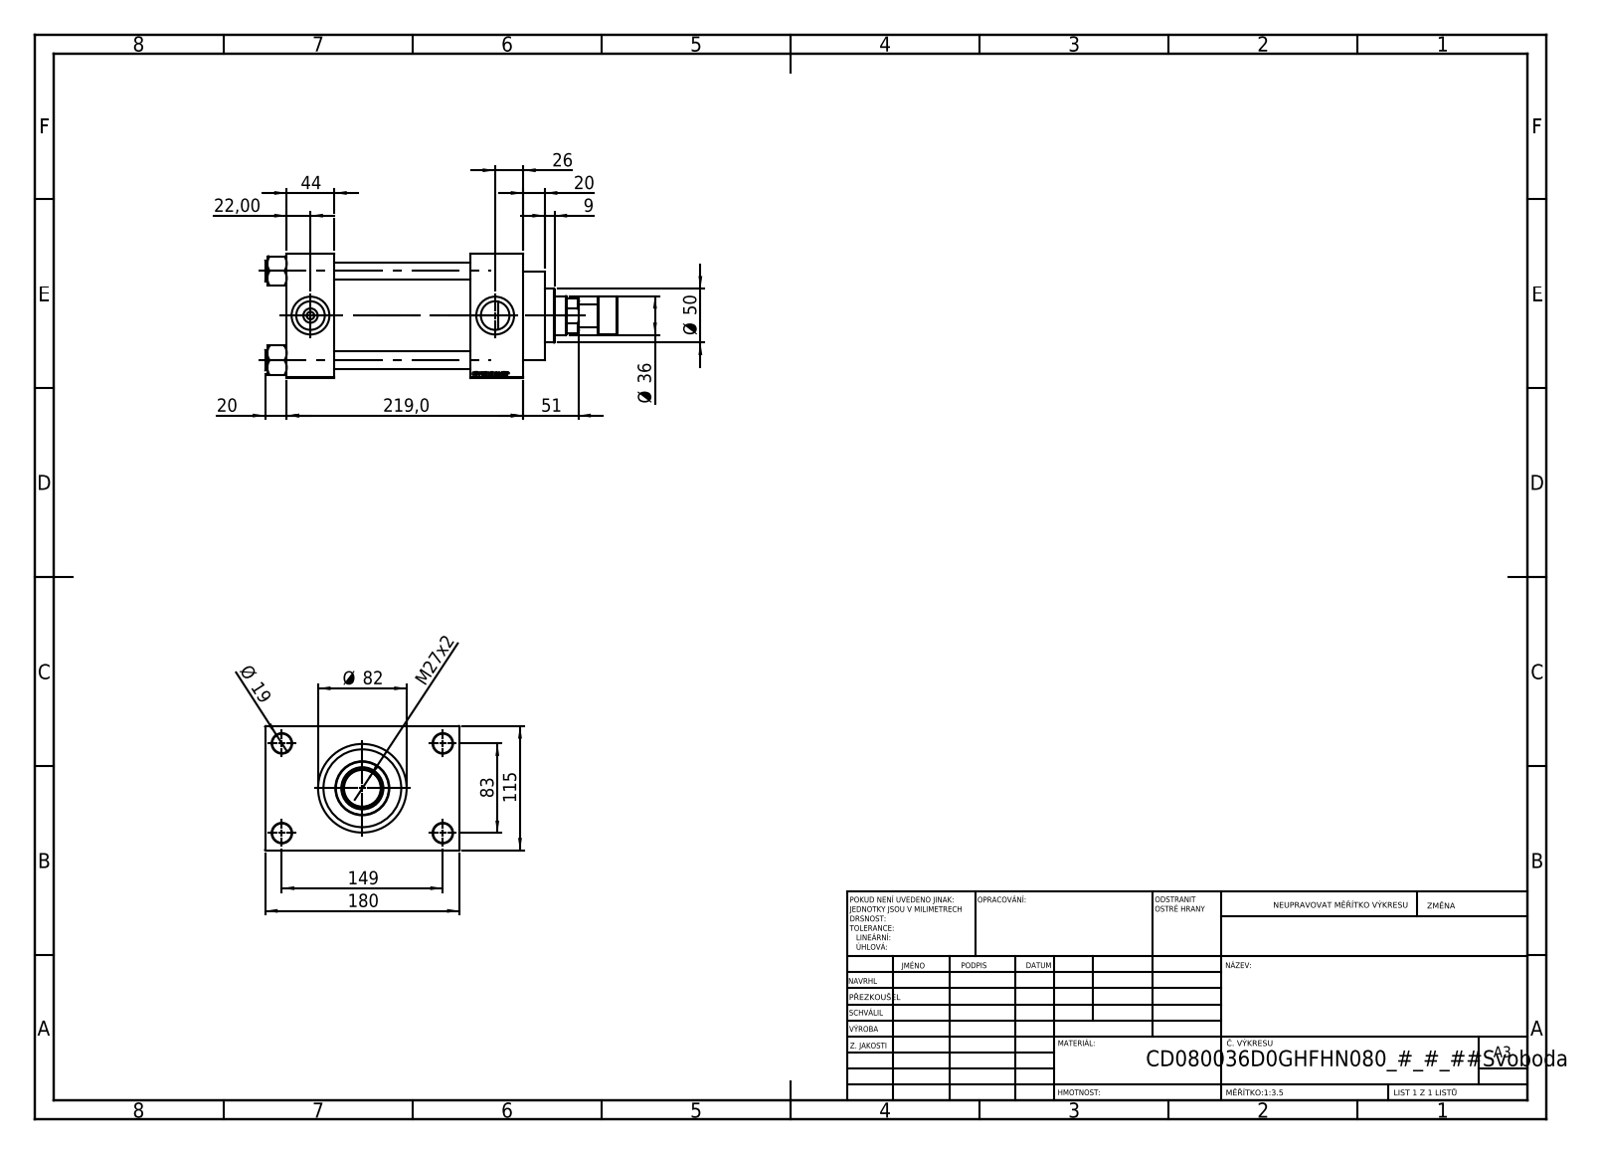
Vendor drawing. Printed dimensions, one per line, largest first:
219,0
180
149
115
83
Ø 82
51
Ø 50
44
Ø 36
M27x2
26
22,00
20
20
Ø 19
9
